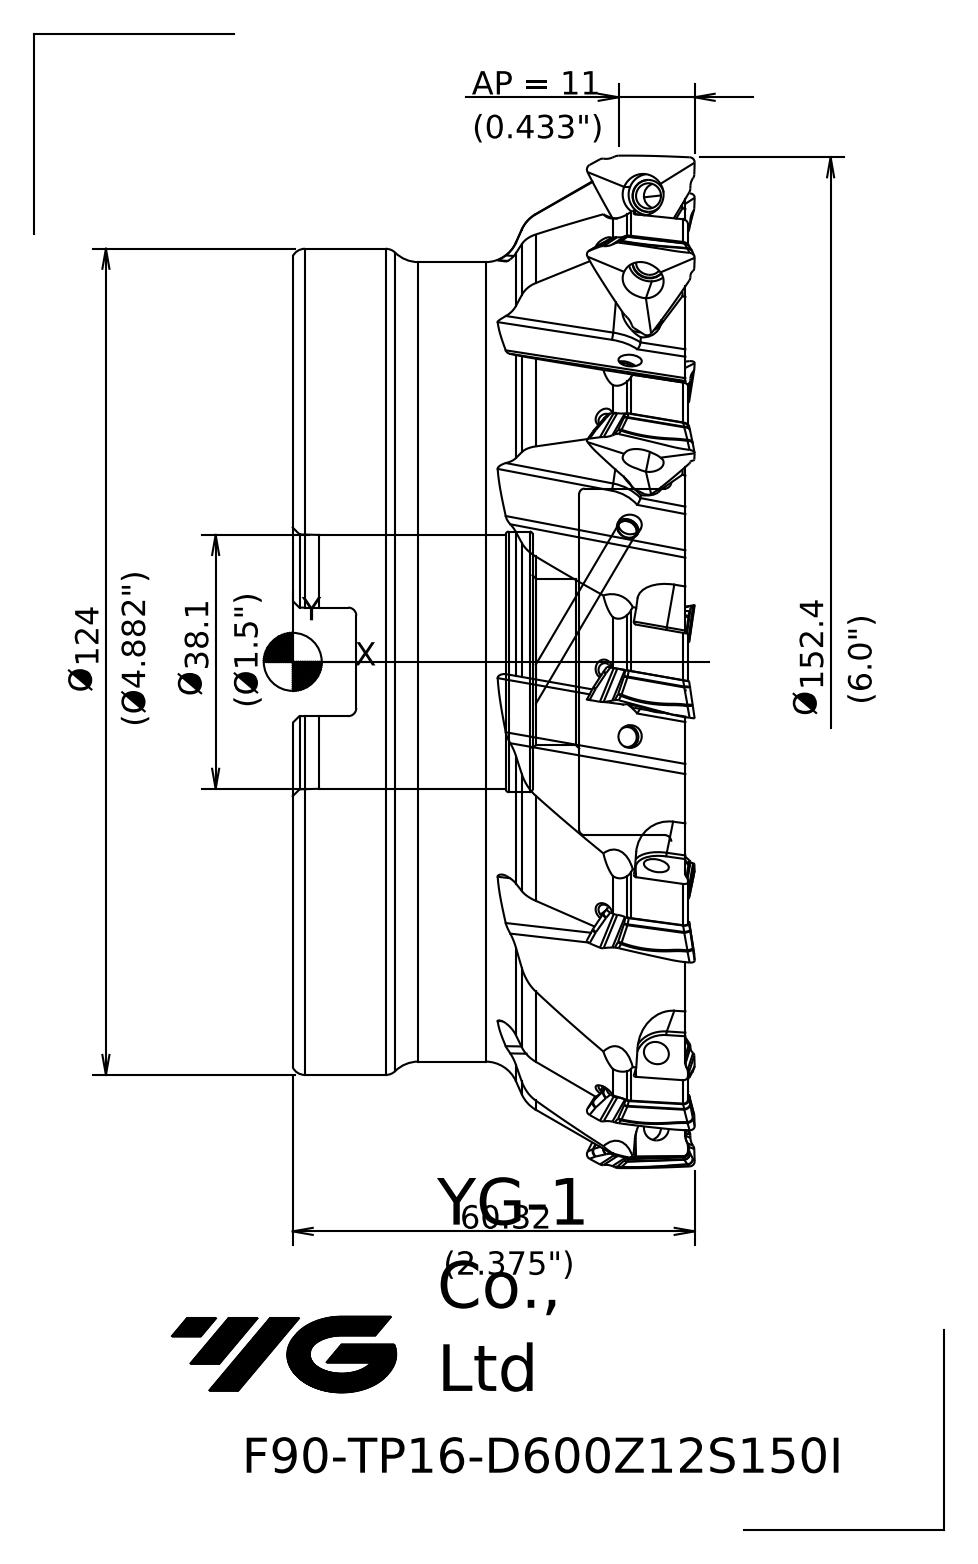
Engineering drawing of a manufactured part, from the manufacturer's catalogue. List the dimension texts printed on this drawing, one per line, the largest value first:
152.4 Ø
60.32
38.1 Ø
AP = 11
